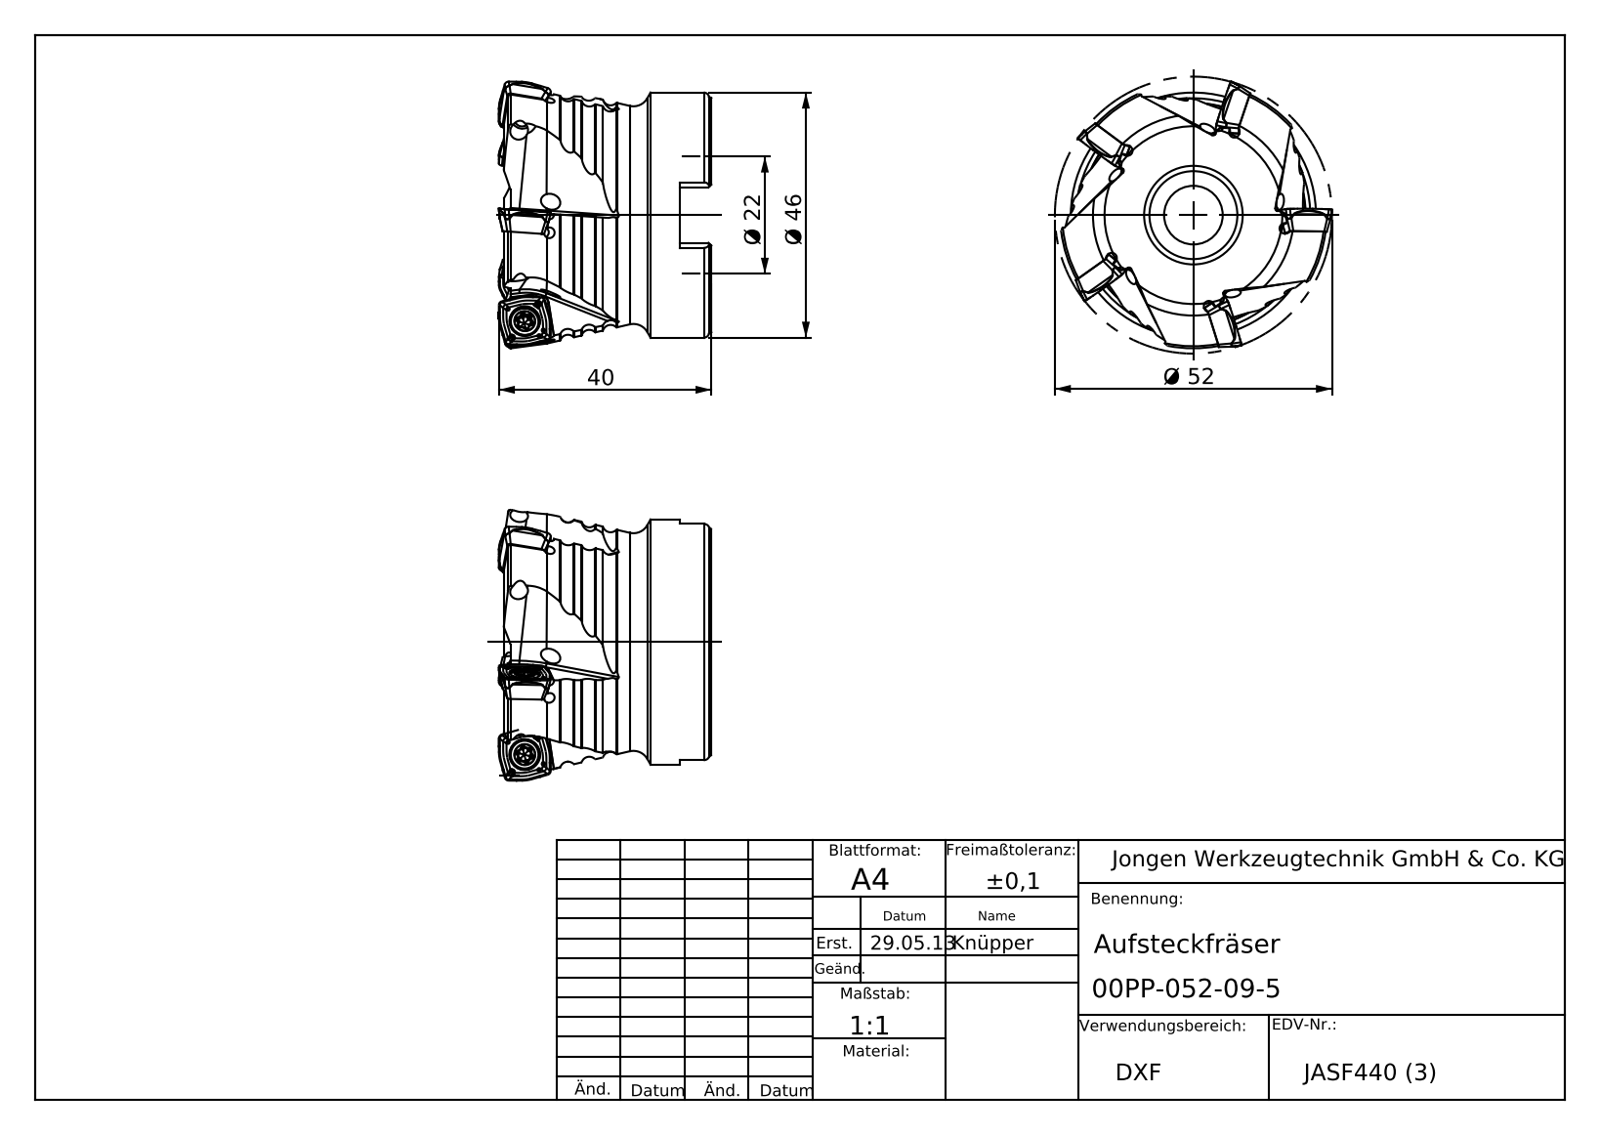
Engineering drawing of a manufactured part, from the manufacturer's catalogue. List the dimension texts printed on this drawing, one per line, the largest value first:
Ø 52
Ø 46
40
Ø 22
